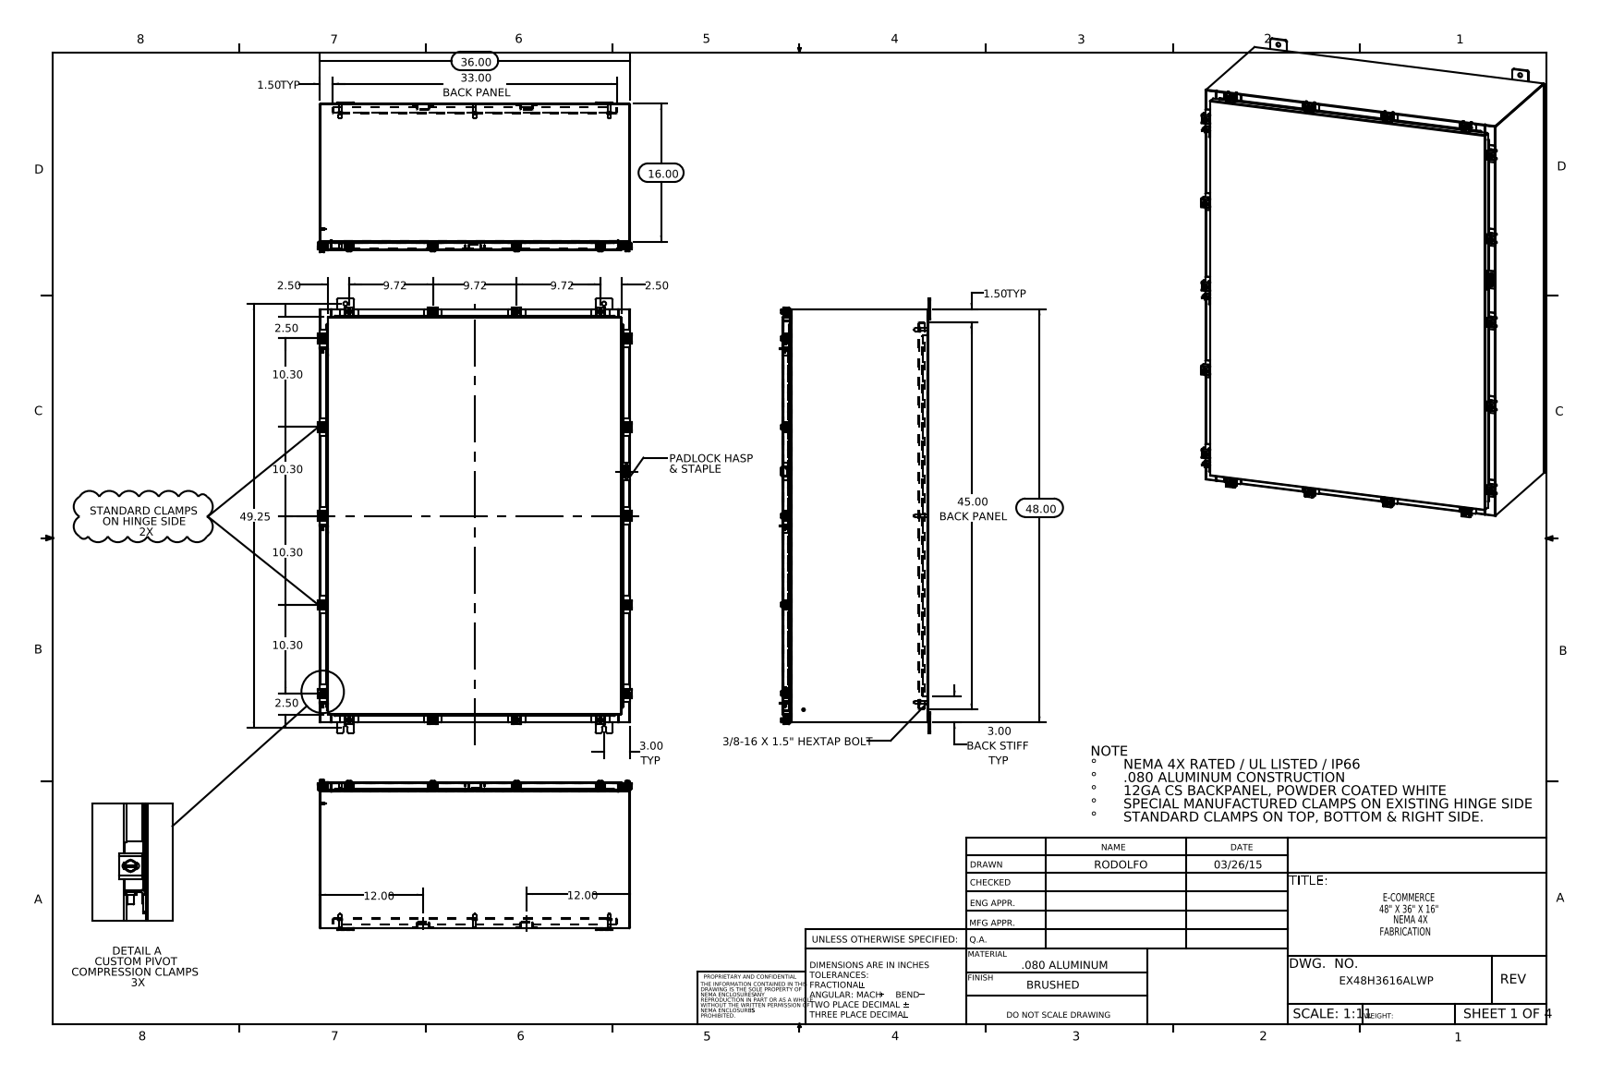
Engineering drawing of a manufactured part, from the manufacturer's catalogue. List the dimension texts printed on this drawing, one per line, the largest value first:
49.25
48.00
45.00 BACK PANEL
36.00
33.00 BACK PANEL
16.00
12.00
12.00
10.30
10.30
10.30
10.30
9.72
9.72
9.72
3.00 TYP
3.00 BACK STIFF TYP
2.50
2.50
2.50
2.50
1.50 TYP
1.50 TYP
